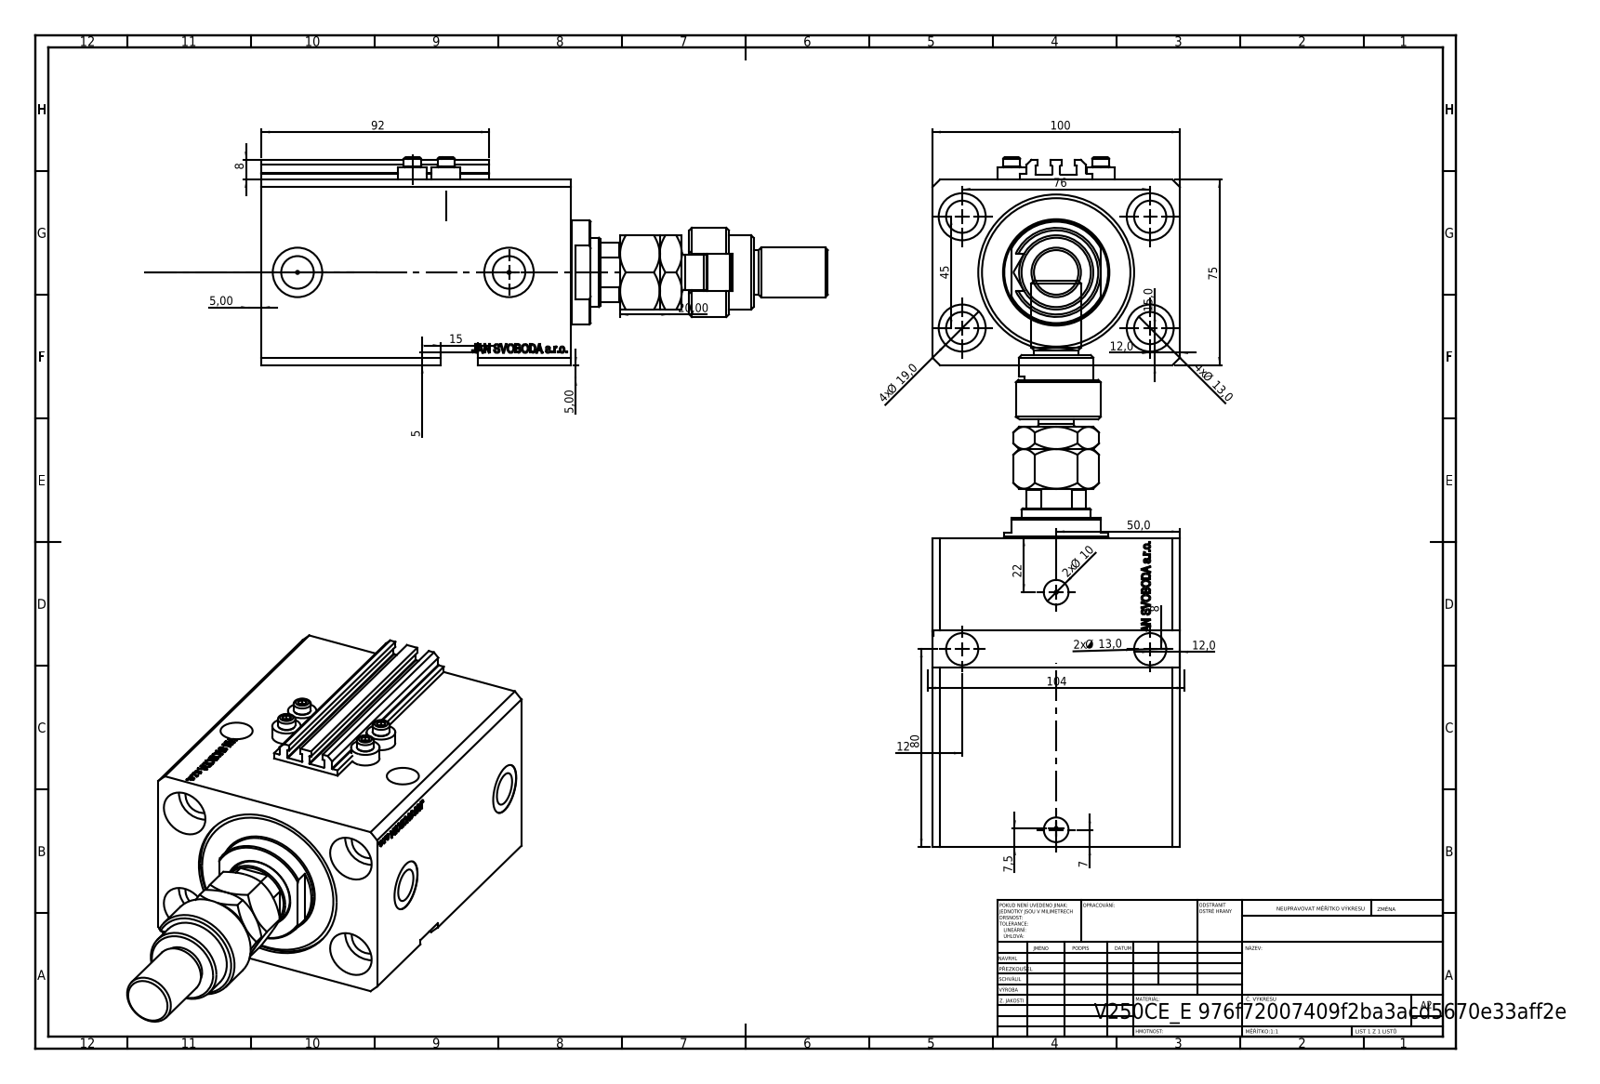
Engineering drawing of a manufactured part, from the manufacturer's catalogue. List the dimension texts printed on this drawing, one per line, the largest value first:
104
100
92
80
76
75
50,0
45
22
20,00
4x Ø 19,0
15,0
15
4x Ø 13,0
2x Ø 13,0
12,0
12,0
12
2x Ø 10
8
8
7,5
7
5,00
5,00
5
